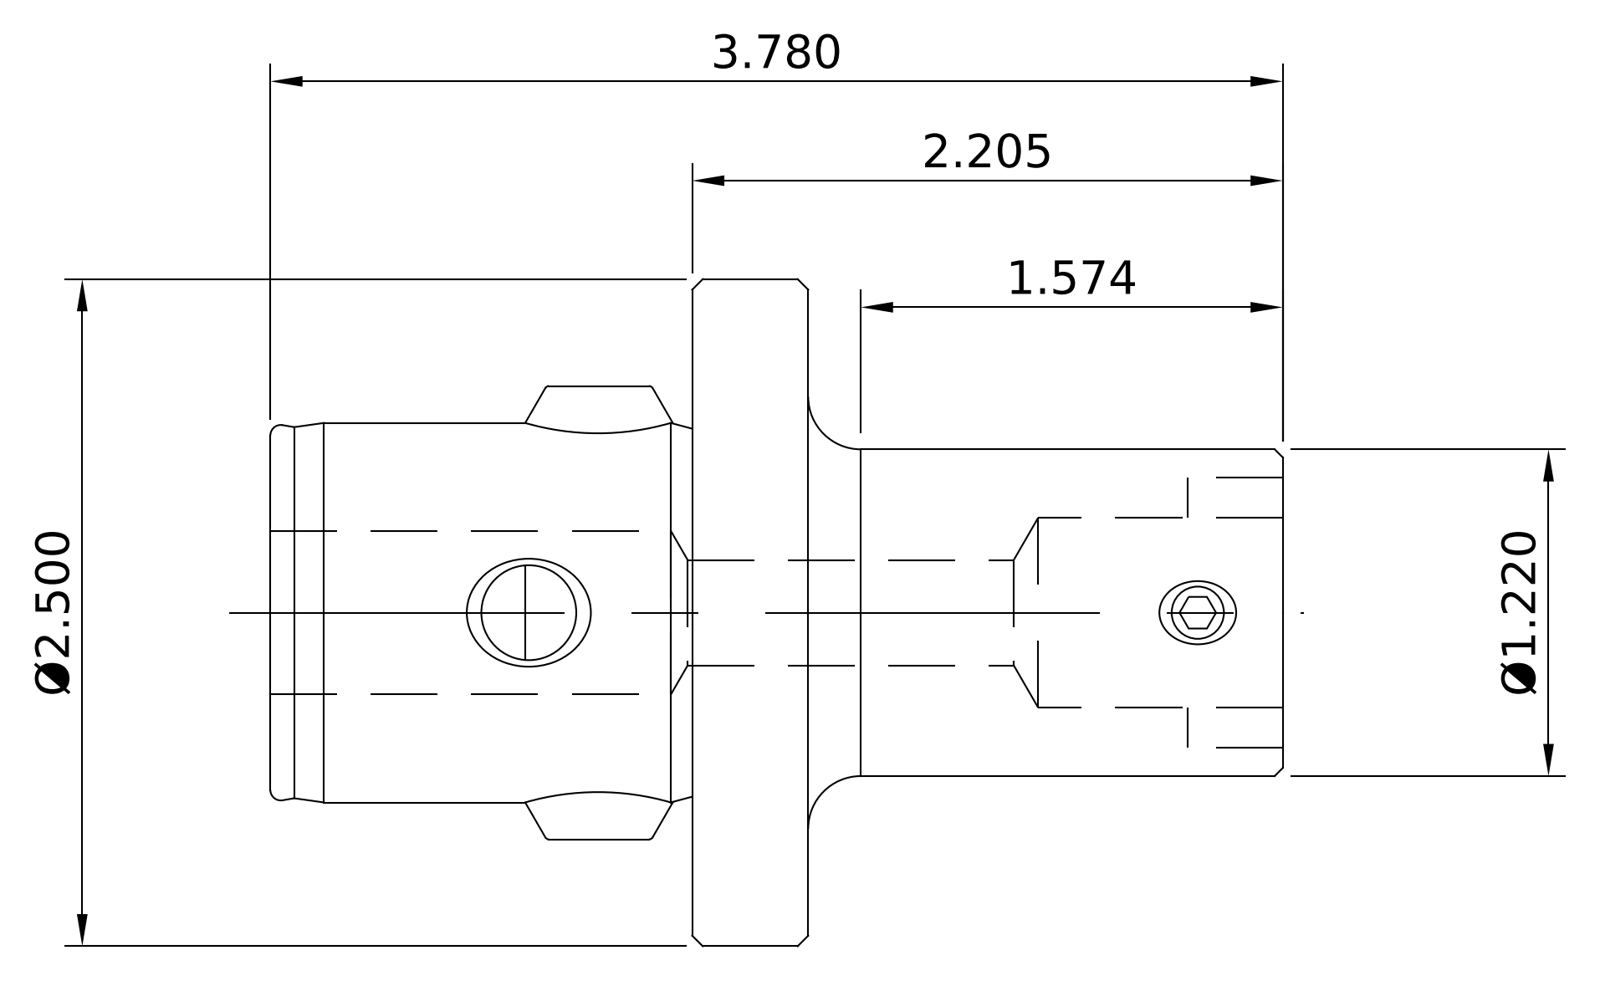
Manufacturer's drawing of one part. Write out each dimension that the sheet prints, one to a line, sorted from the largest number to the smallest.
3.780
Ø2.500
2.205
1.574
Ø1.220
